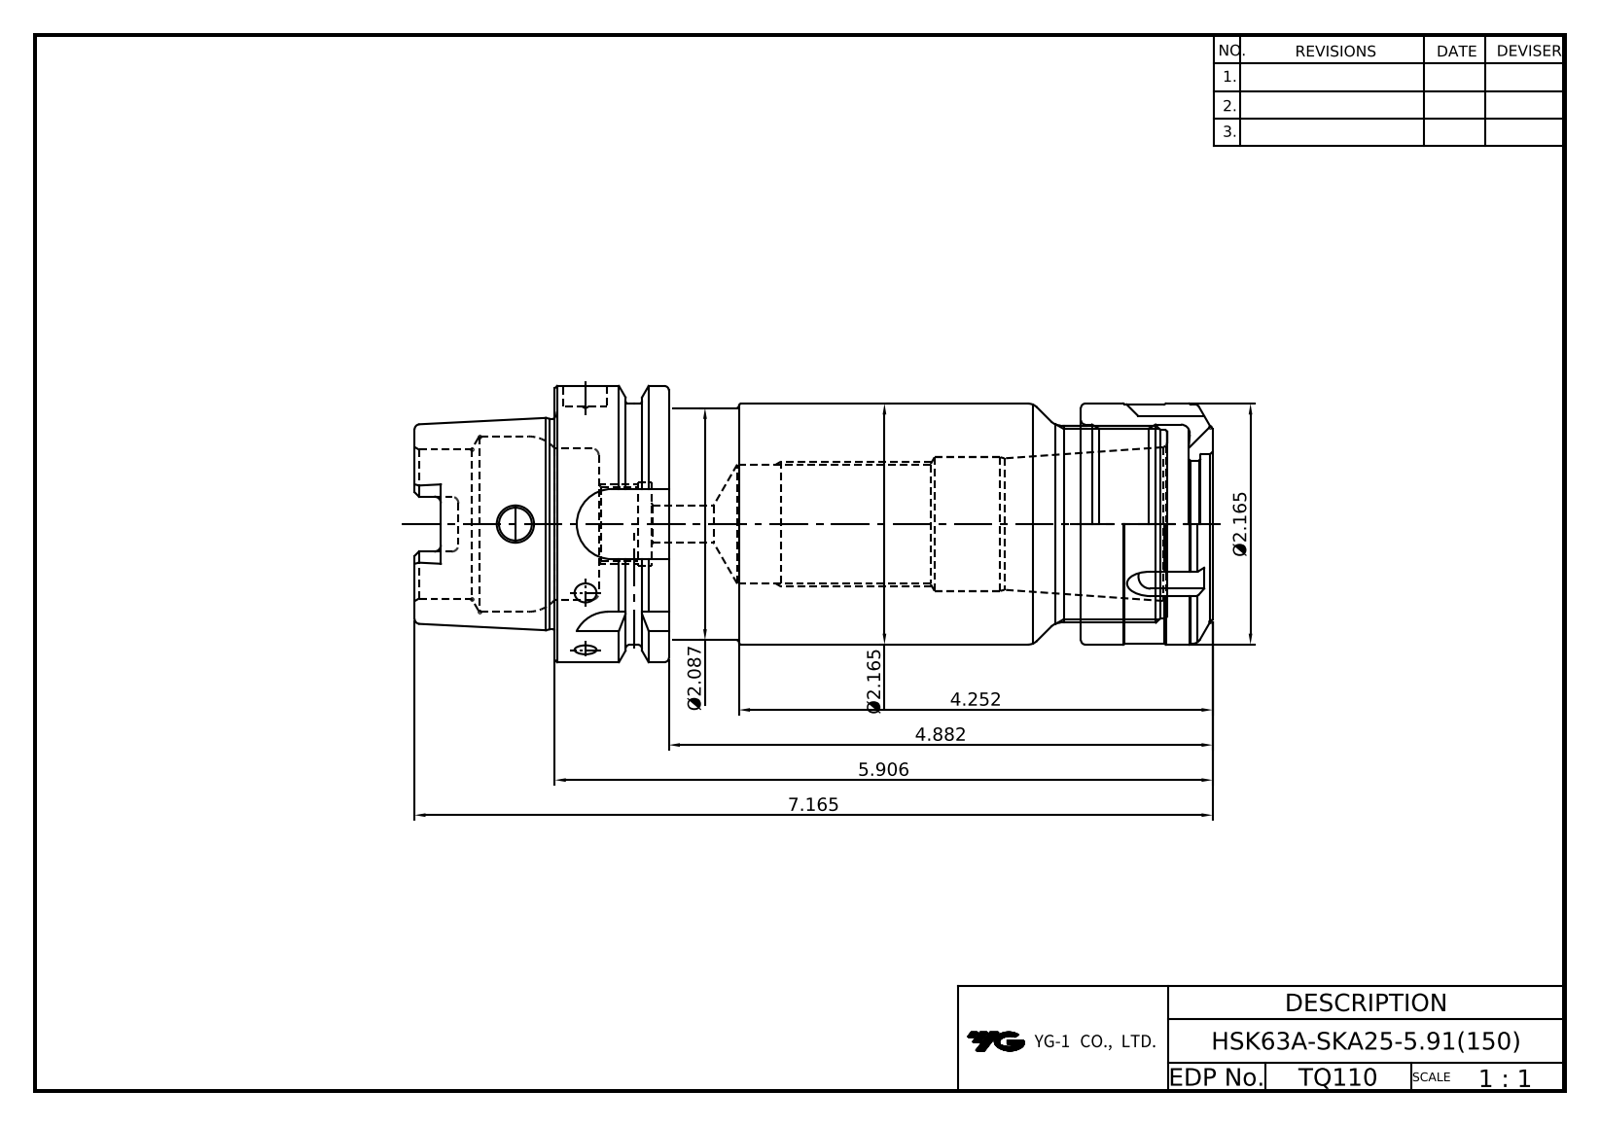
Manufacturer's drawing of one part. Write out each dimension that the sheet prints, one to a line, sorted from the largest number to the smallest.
7.165
5.906
4.882
4.252
Ø2.165
Ø2.165
Ø2.087
